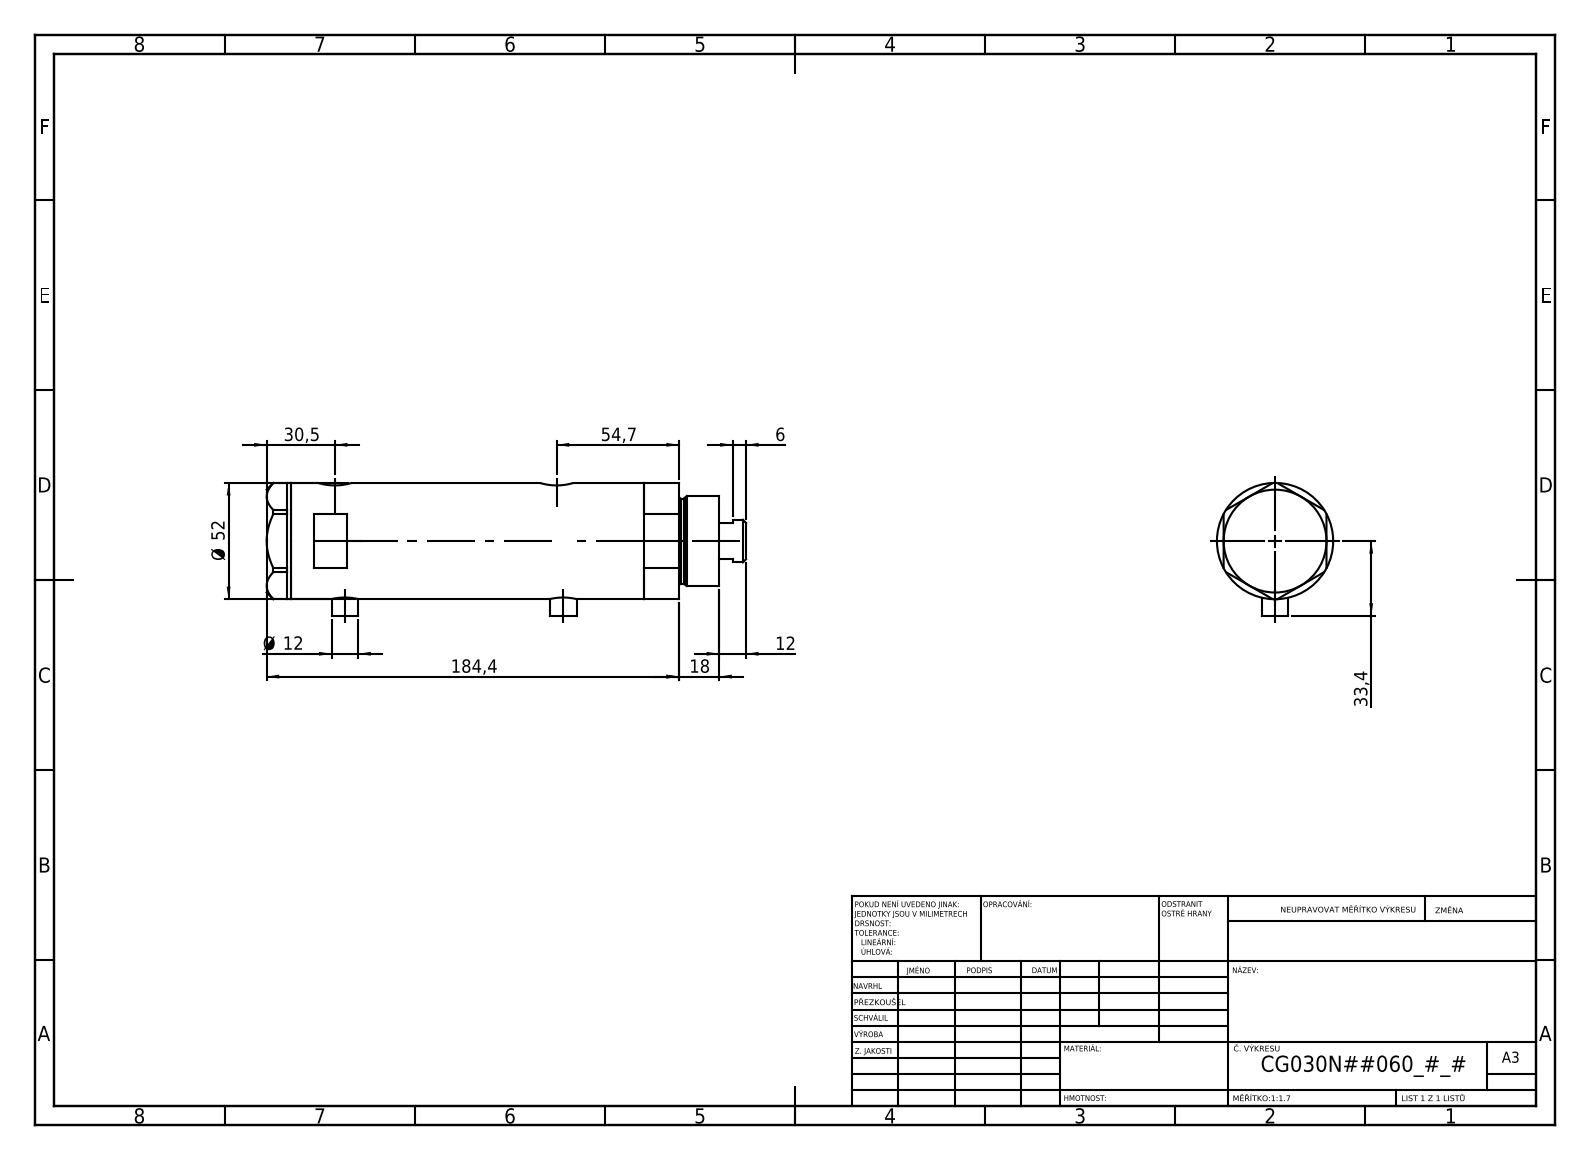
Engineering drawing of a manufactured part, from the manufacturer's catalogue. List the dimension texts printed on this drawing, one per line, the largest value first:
184,4
54,7
Ø 52
33,4
30,5
18
12
Ø 12
6
